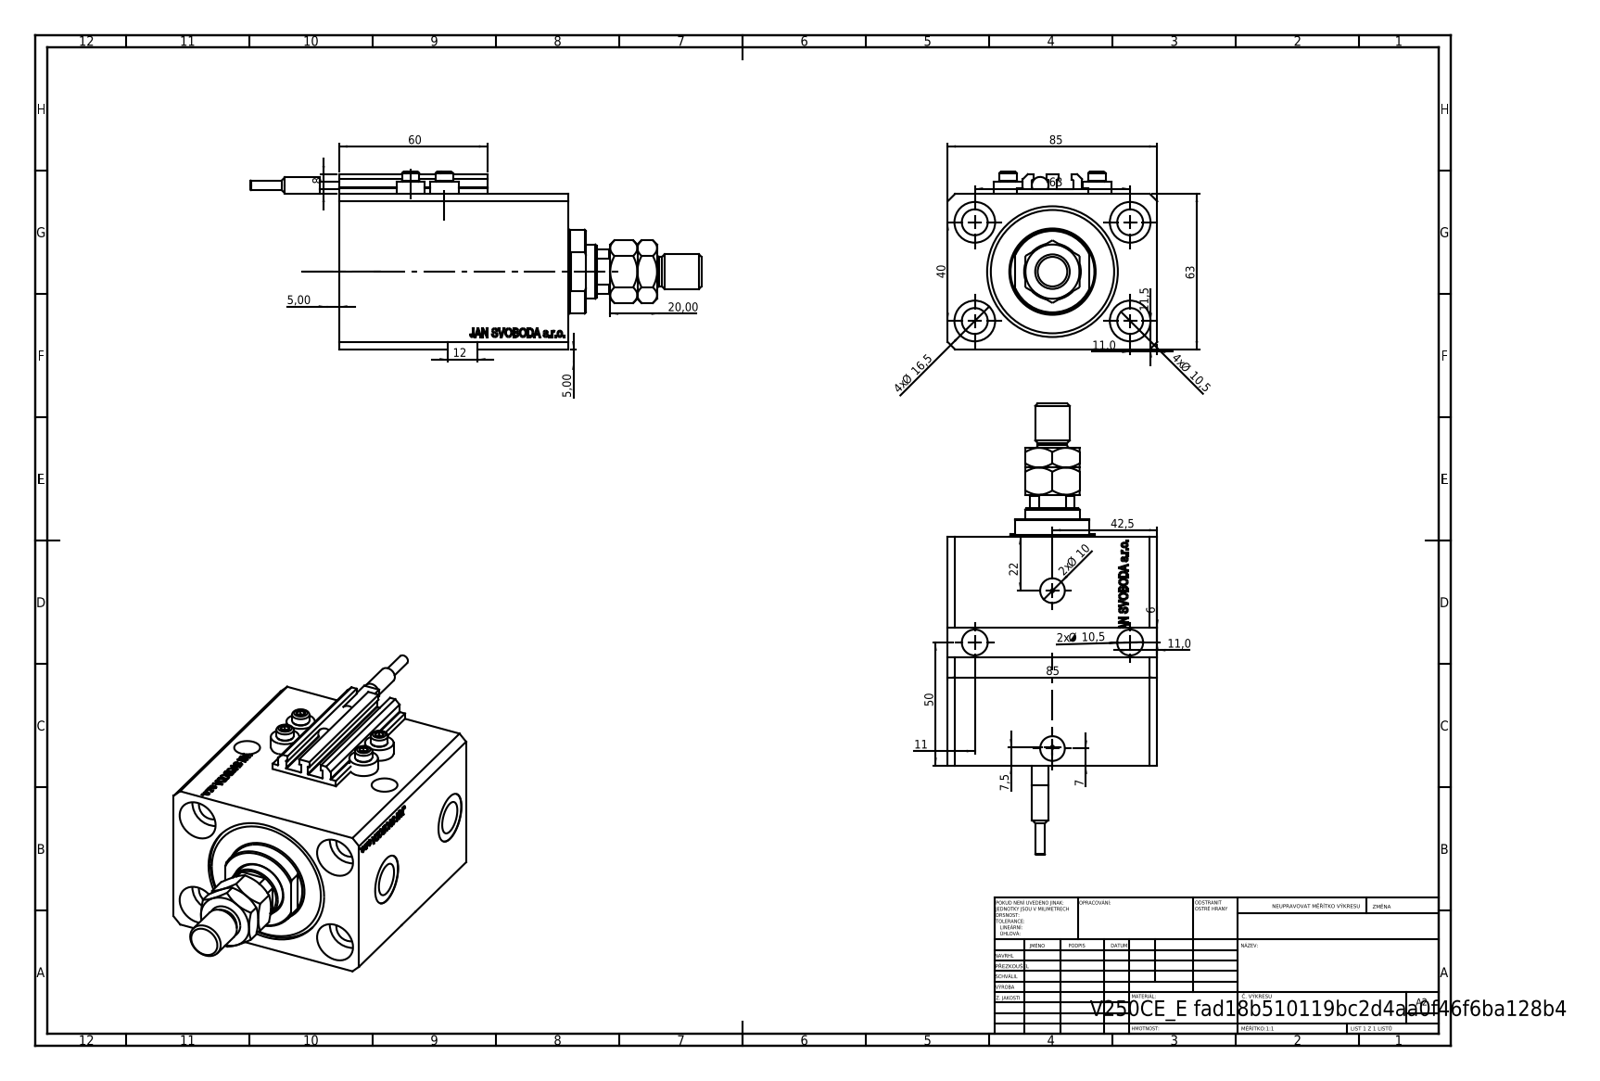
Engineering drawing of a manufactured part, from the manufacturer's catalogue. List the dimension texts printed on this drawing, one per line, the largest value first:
85
85
63
63
60
50
42,5
40
22
20,00
4x Ø 16,5
12
11,5
11,0
11,0
11
4x Ø 10,5
2x Ø 10,5
2x Ø 10
8
7,5
7
6
5,00
5,00
